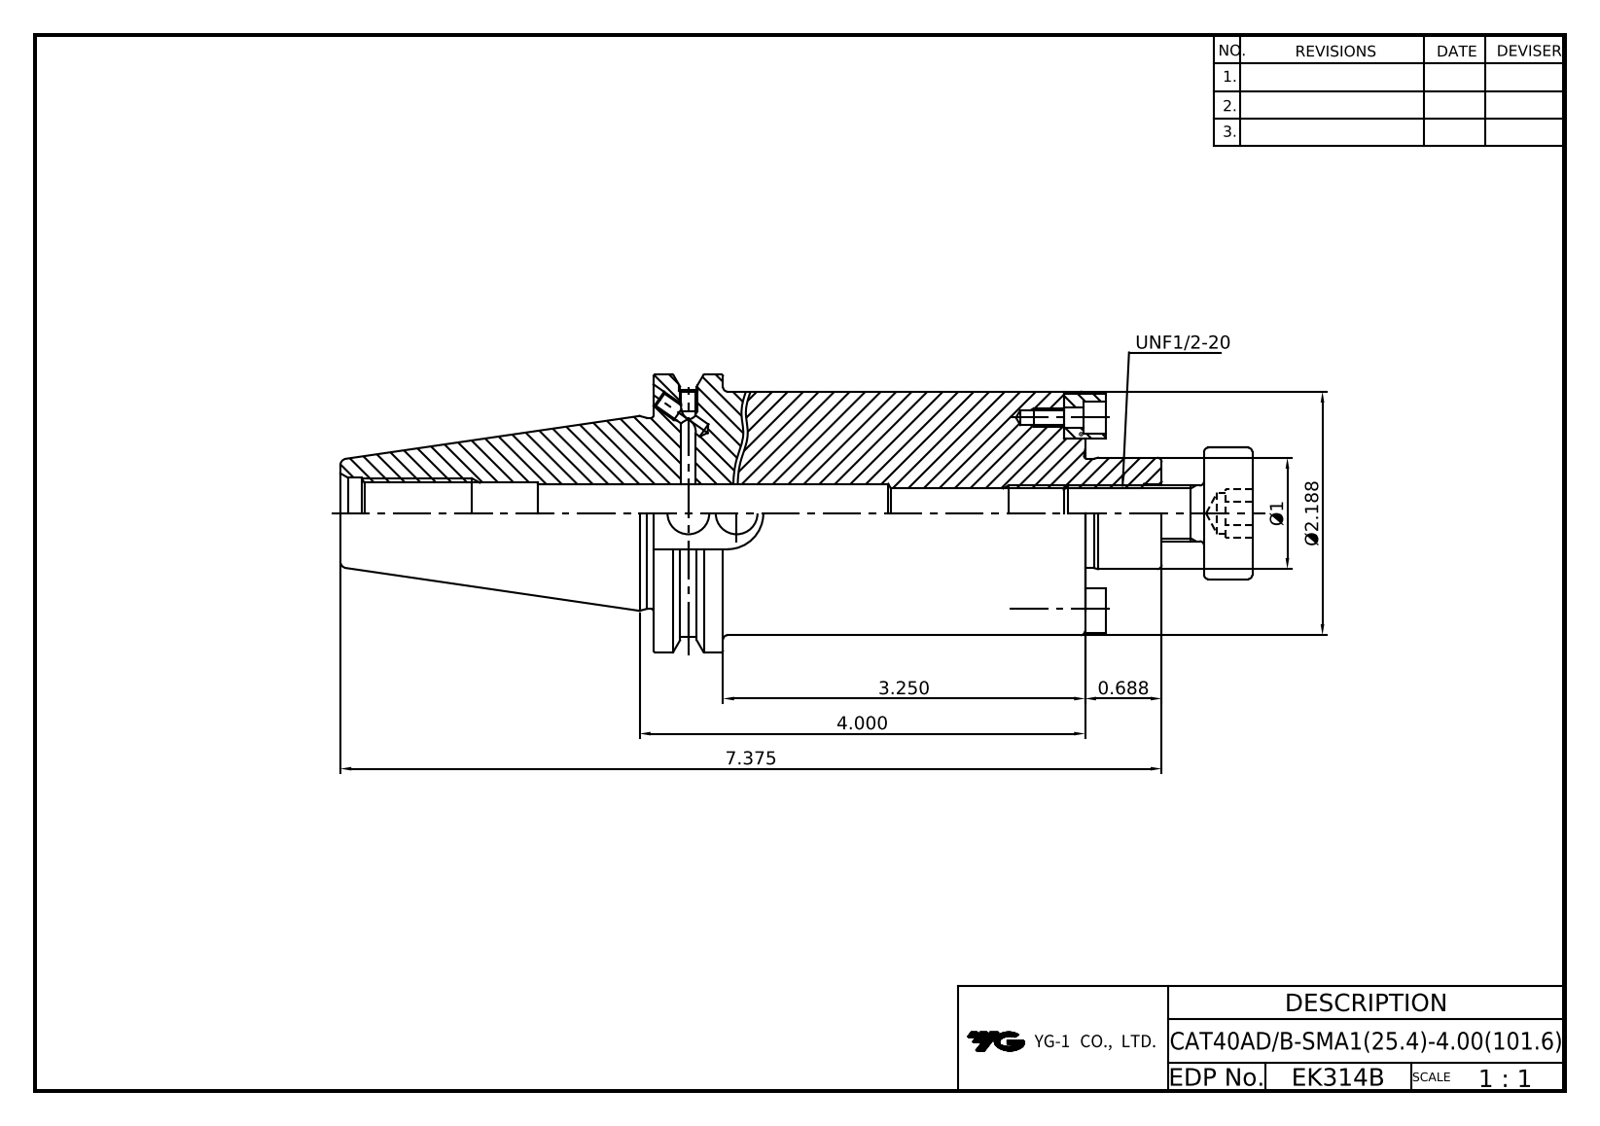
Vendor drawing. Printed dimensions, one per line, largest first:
7.375
4.000
3.250
Ø2.188
Ø1
0.688
